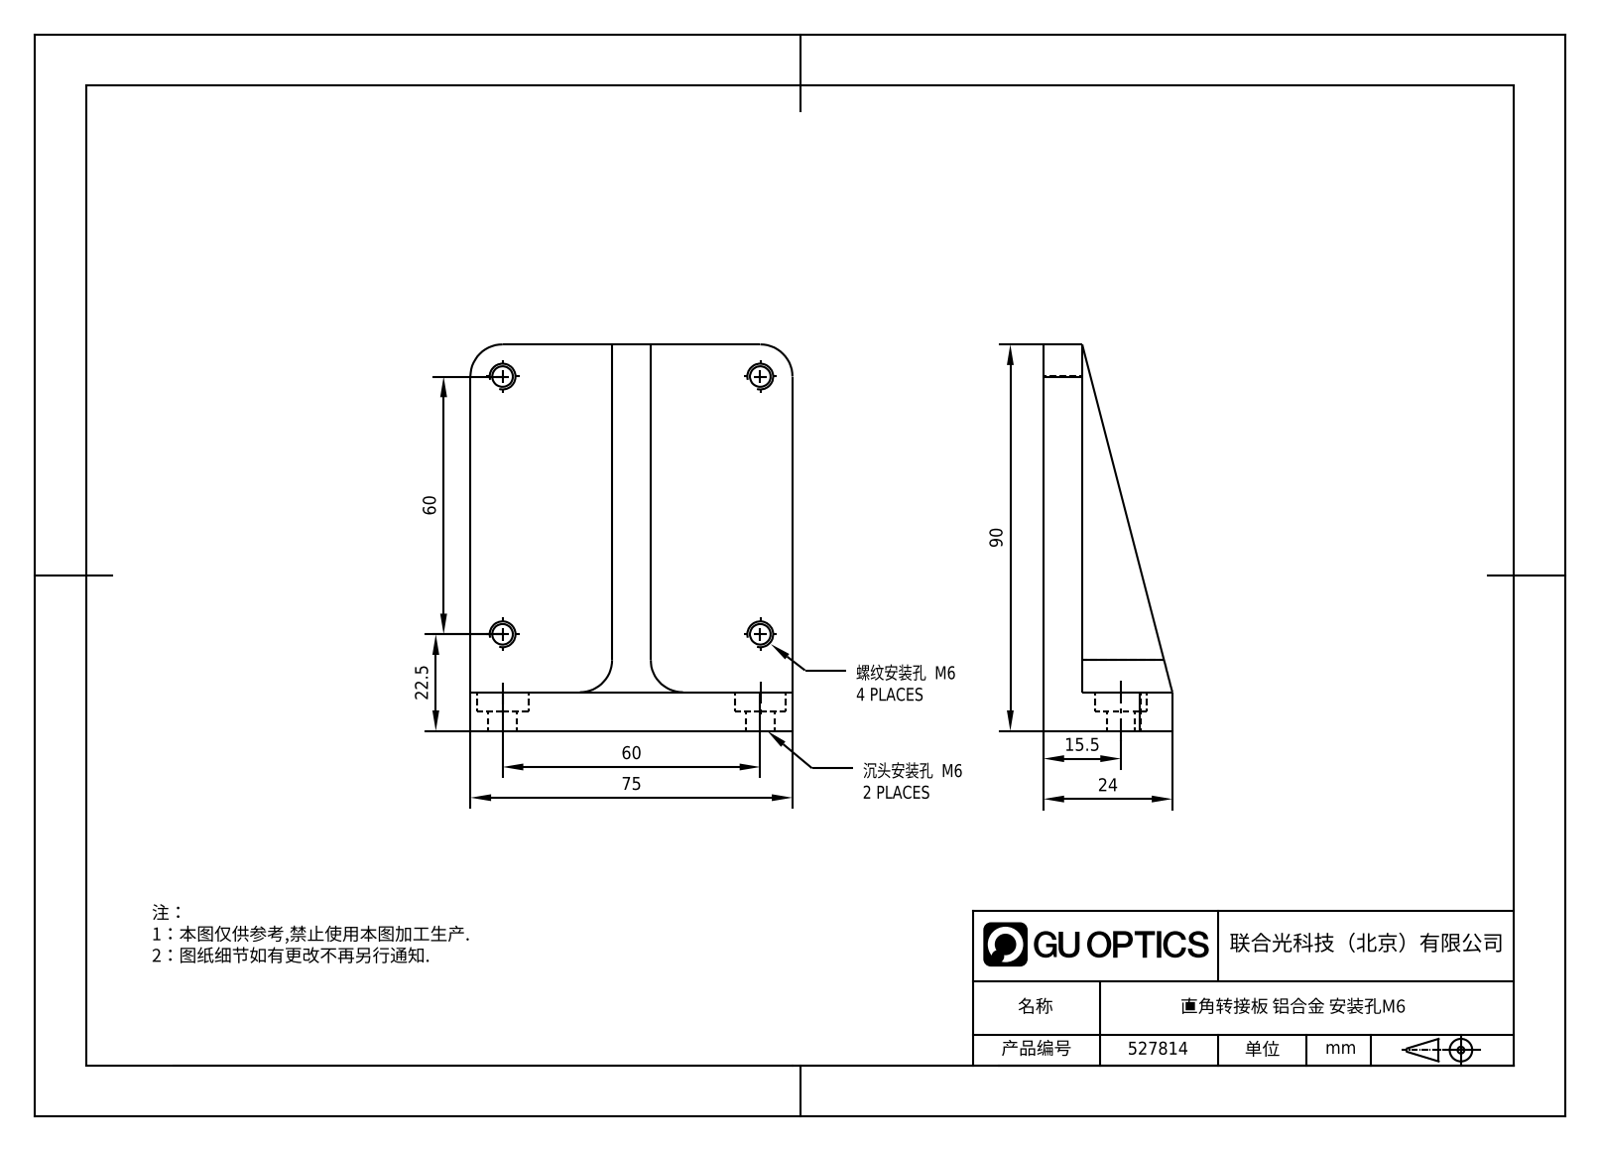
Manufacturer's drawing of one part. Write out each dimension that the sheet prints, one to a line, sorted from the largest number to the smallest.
90
75
60
60
24
22.5
15.5
